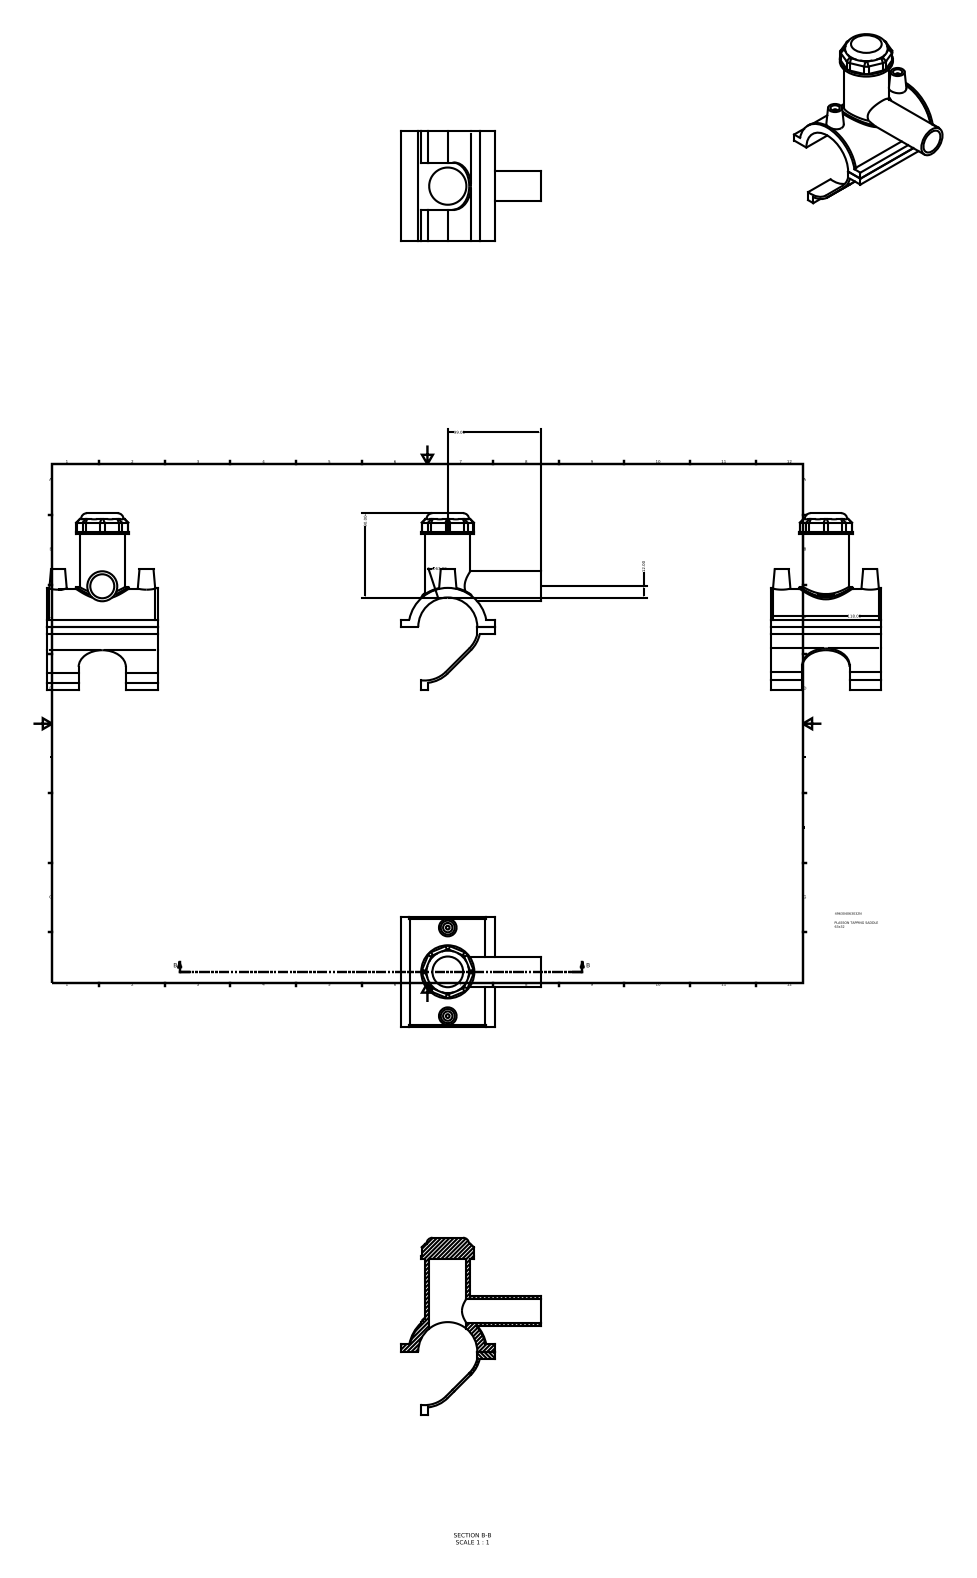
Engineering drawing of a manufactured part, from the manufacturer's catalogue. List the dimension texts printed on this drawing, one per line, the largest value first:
118.00
99.00
90.00
∅63.00
12.00
